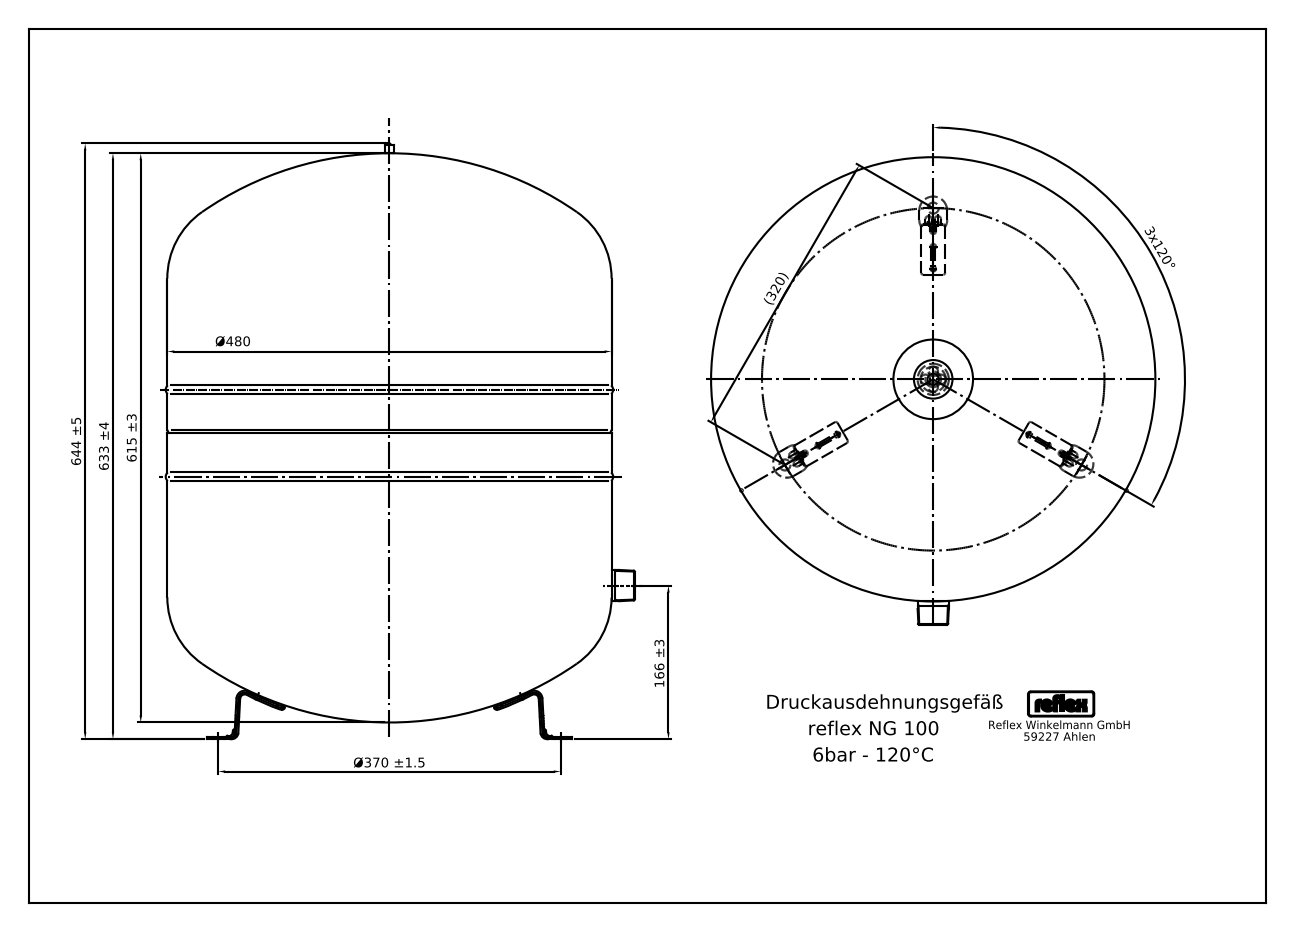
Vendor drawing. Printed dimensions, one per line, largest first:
644 ±5
633 ±4
615 ±3
Ø480
Ø370 ±1.5
(320)
166 ±3
3x120°
